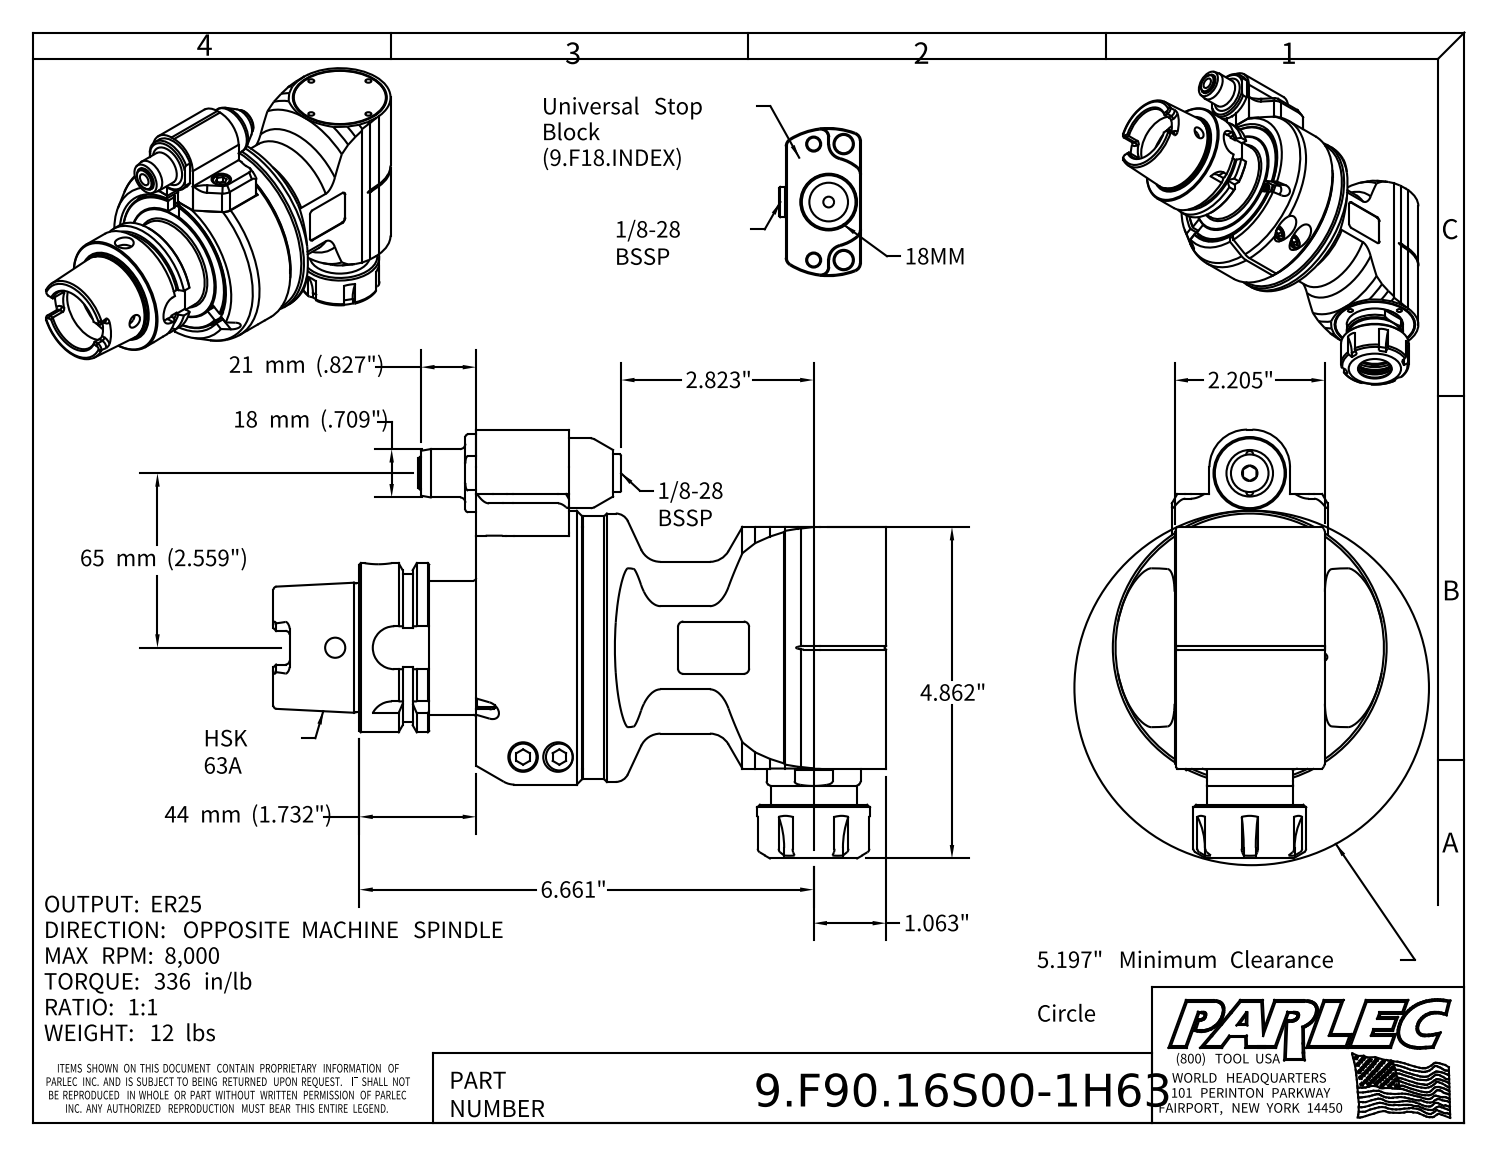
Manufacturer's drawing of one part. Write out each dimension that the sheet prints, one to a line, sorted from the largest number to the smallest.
65 mm (2.559")
44 mm (1.732")
21 mm (.827")
18 mm (.709")
6.661"
4.862"
2.823"
2.205"
1.063"
